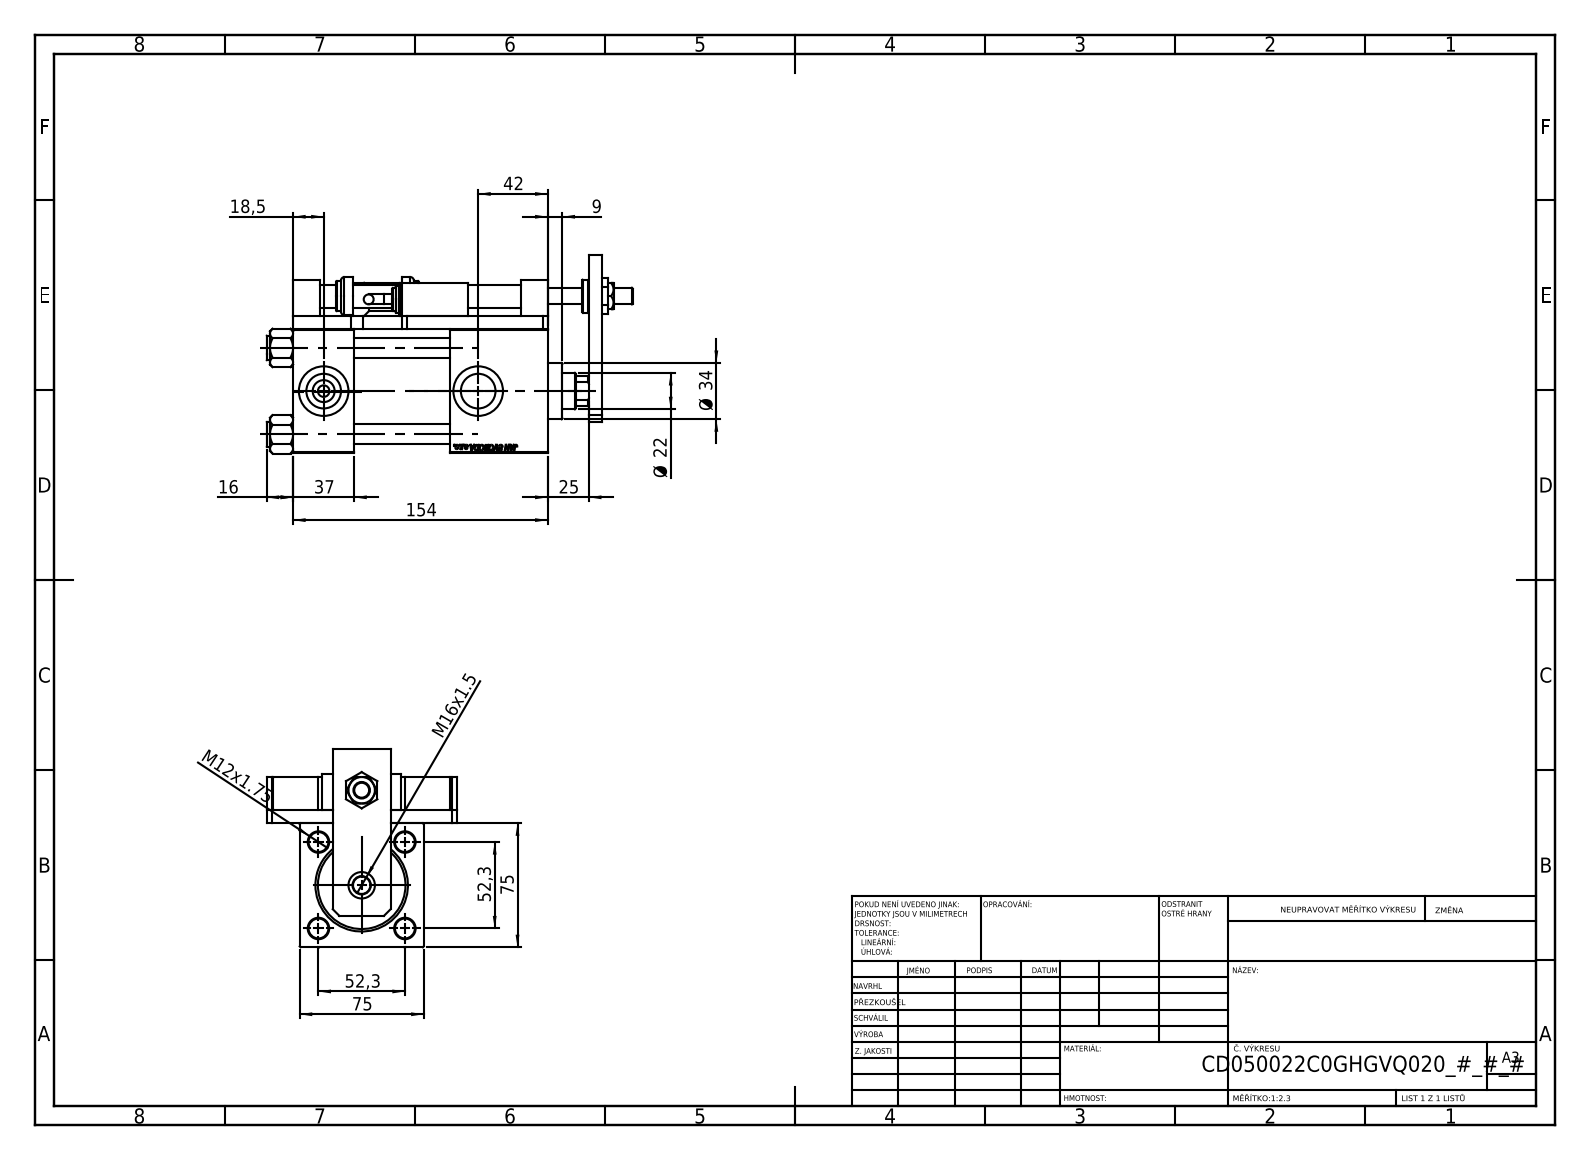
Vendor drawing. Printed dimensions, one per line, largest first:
154
75
75
52,3
52,3
42
37
Ø 34
25
Ø 22
18,5
16
M16x1.5
M12x1.75
9
